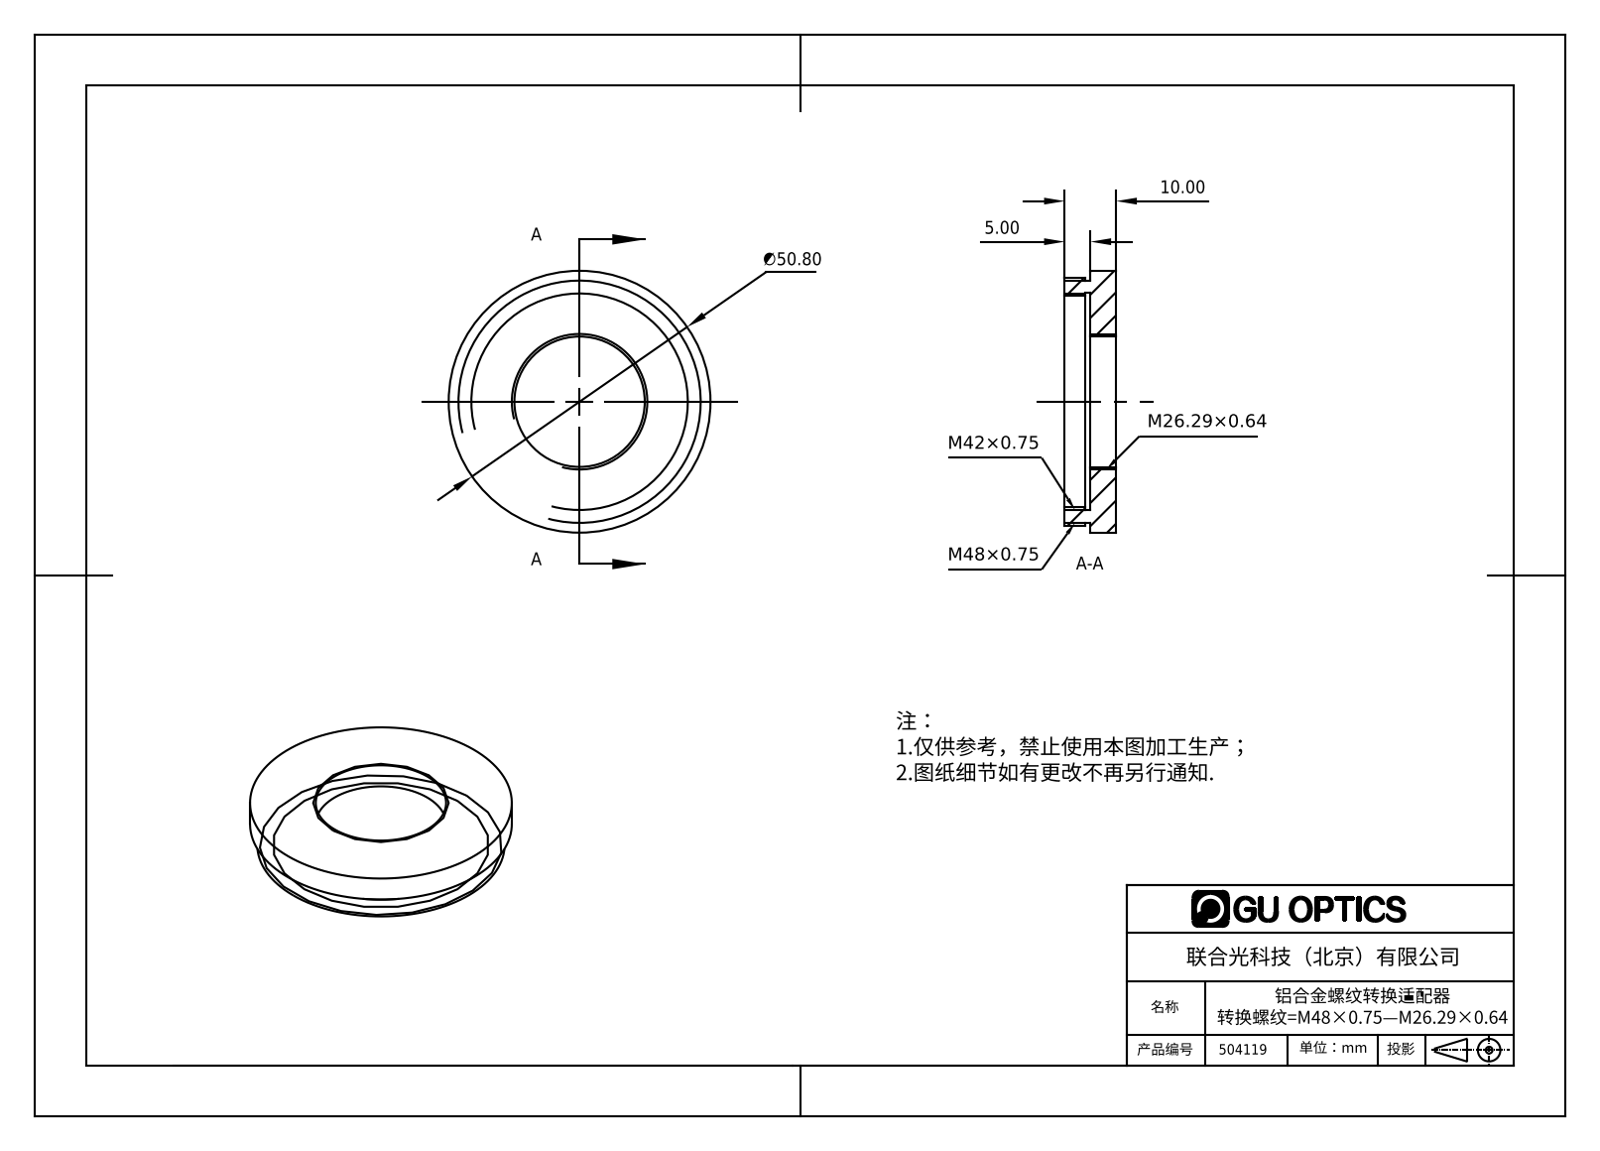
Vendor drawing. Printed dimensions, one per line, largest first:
∅50.80
10.00
5.00
